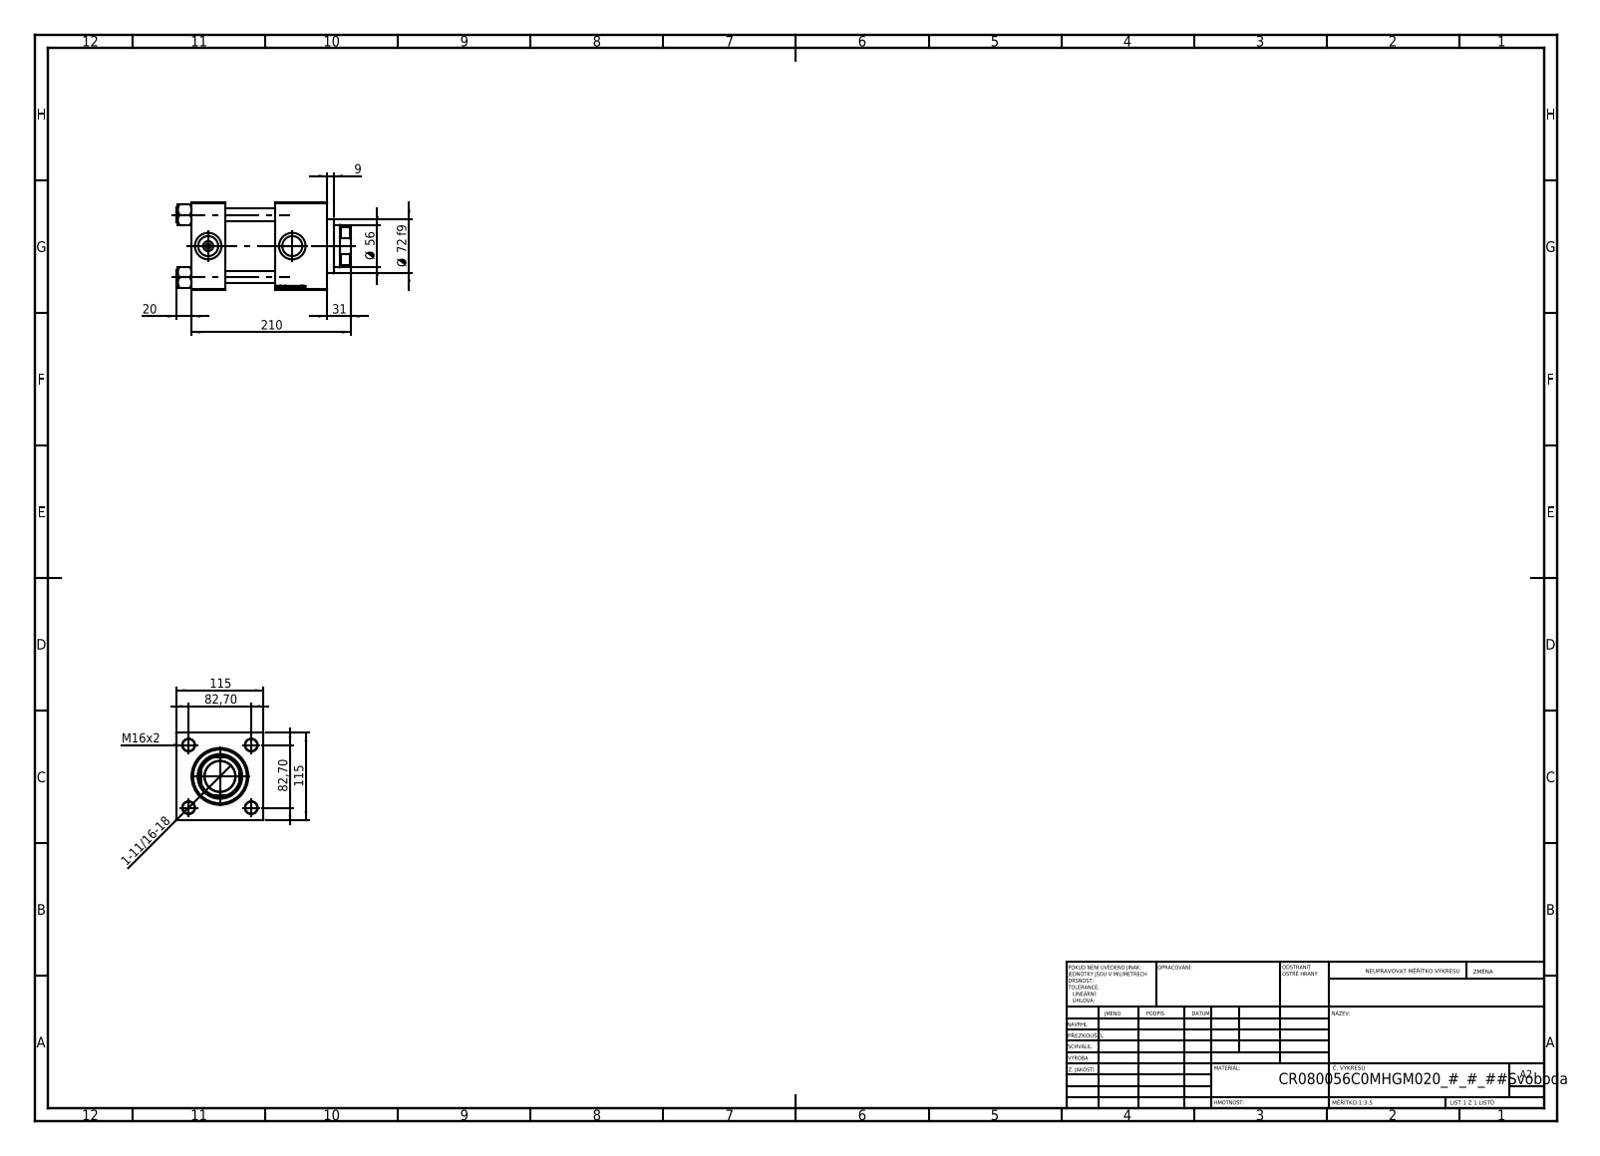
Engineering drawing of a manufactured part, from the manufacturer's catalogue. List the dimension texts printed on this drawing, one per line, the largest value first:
210
115
115
82,70
82,70
Ø 72 f9
Ø 56
31
20
M16x2
9
1-11/16-18
